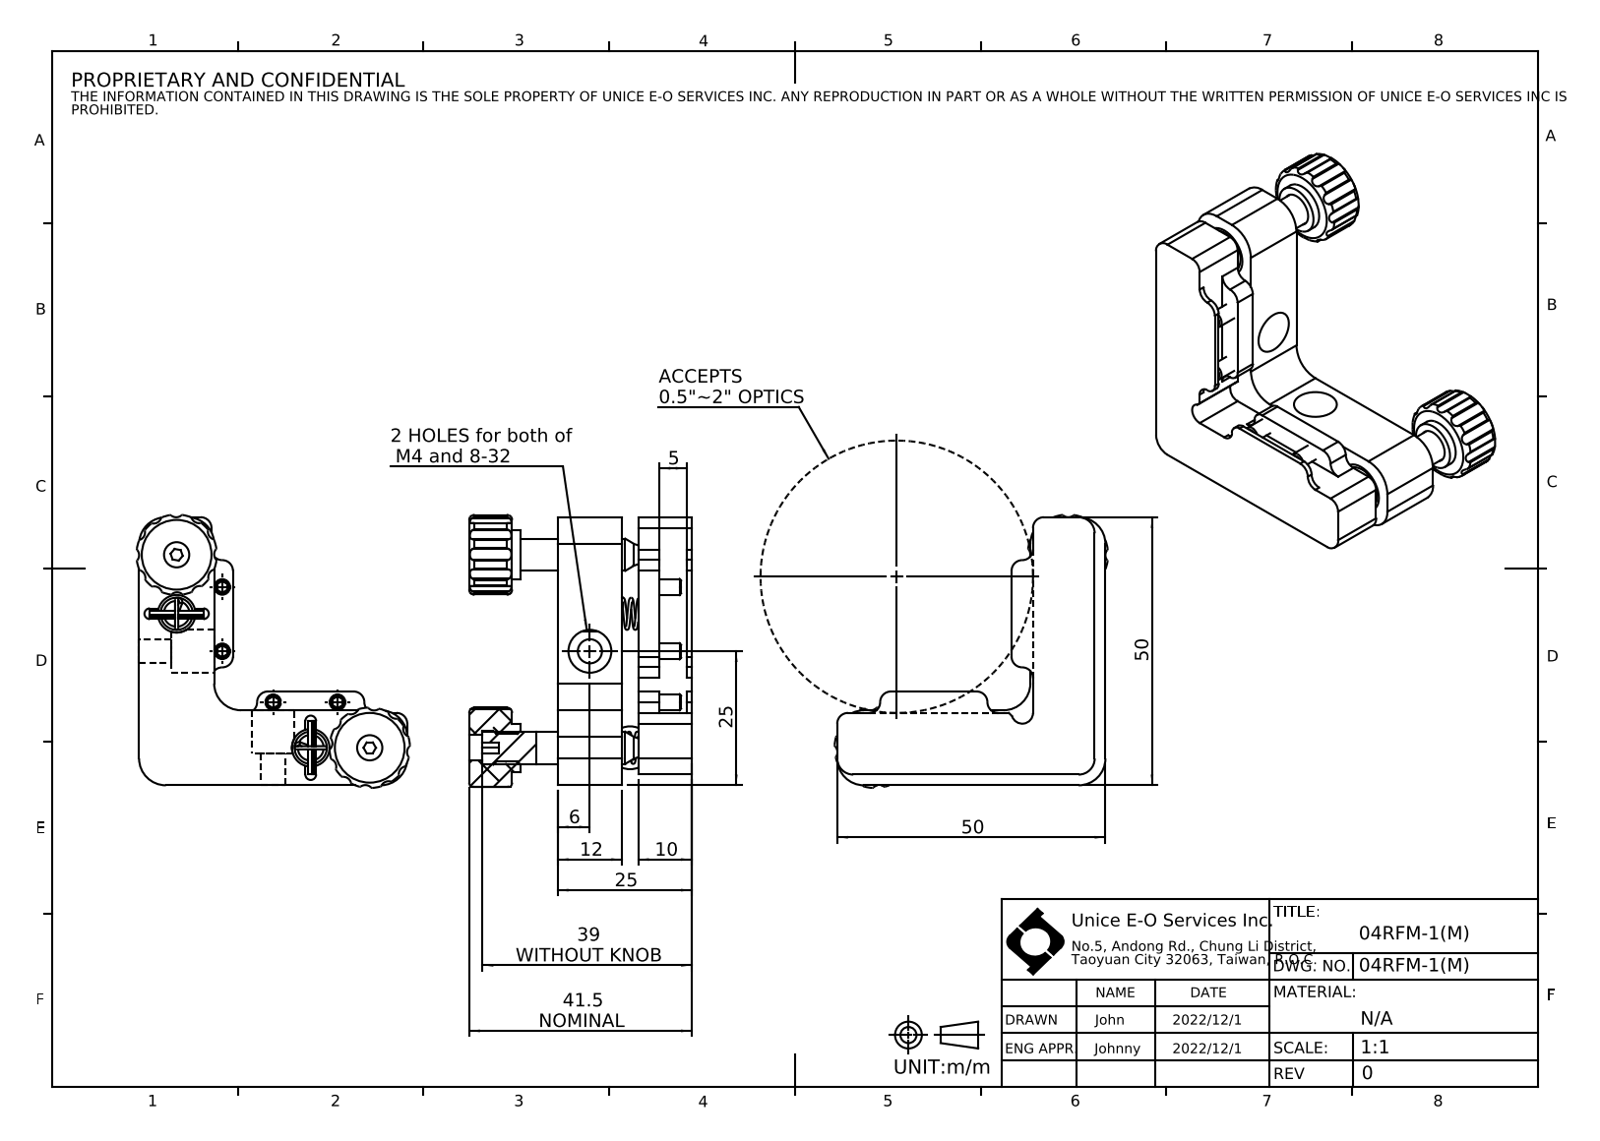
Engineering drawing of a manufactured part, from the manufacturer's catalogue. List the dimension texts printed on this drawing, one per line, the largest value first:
50
50
41.5 NOMINAL
39 WITHOUT KNOB
25
25
12
10
6
5
2 HOLES for both of M4 and 8-32
ACCEPTS 0.5"~2" OPTICS
